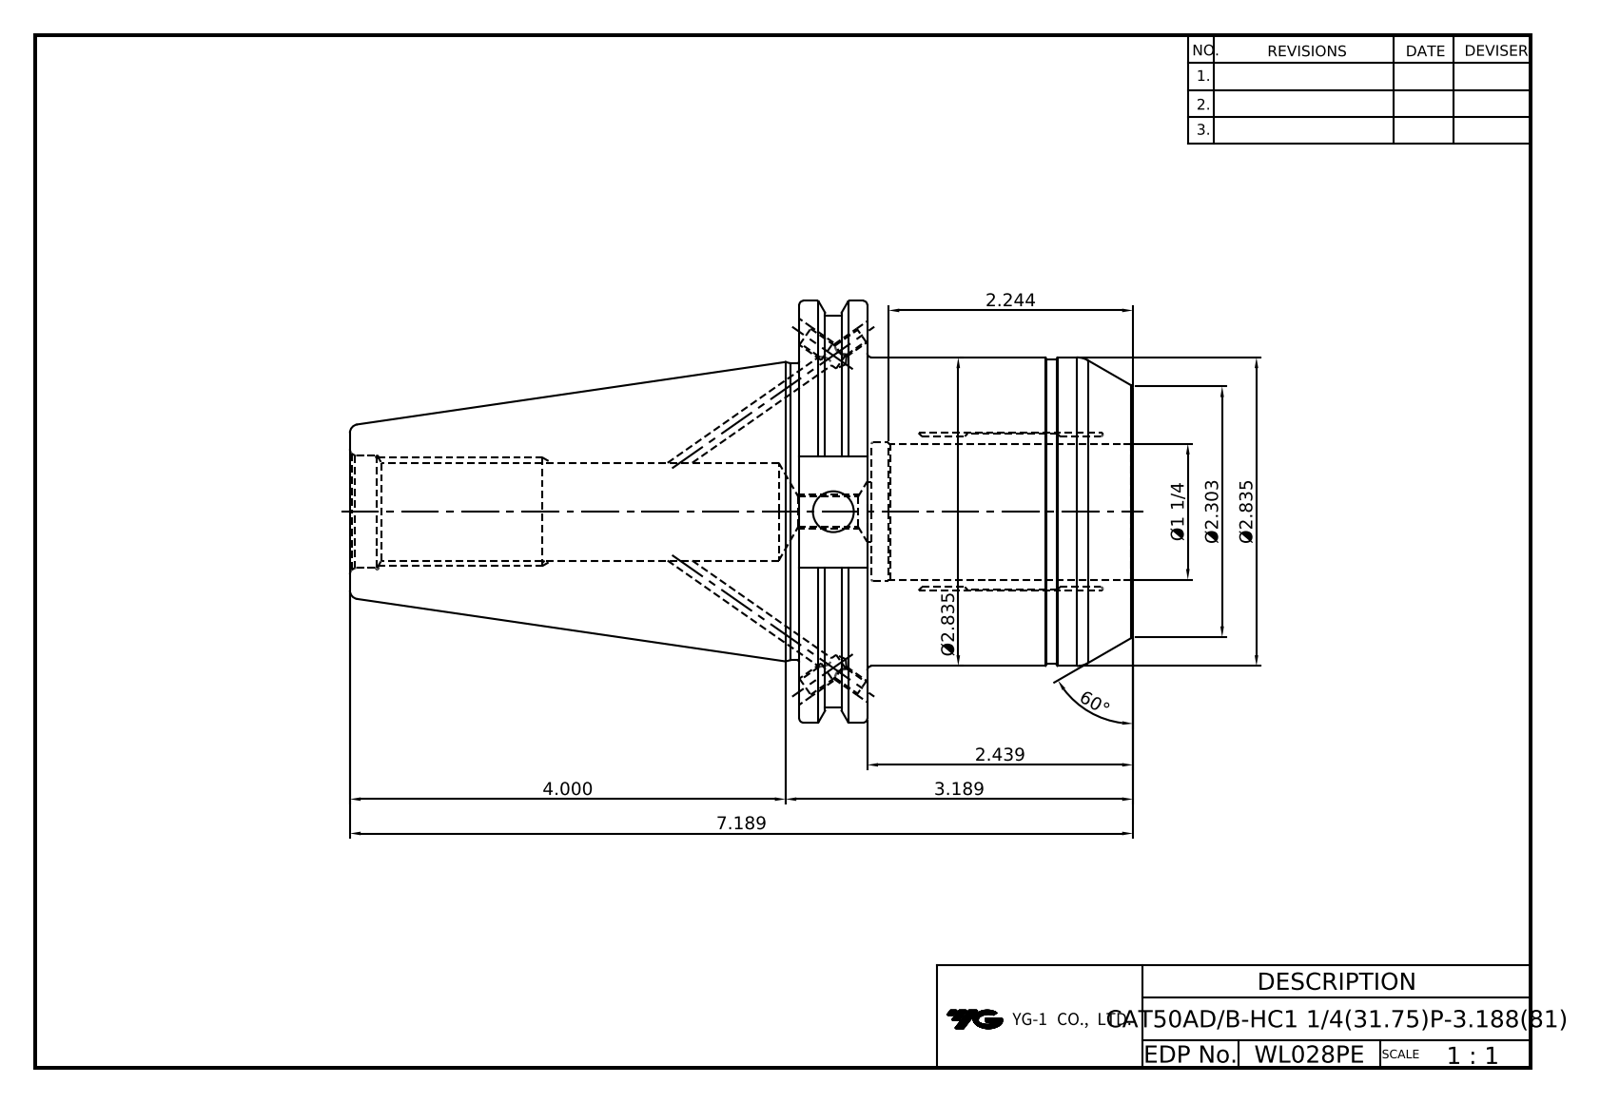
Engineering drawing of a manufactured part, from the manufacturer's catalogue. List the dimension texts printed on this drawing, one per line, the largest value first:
60°
7.189
4.000
3.189
Ø2.835
Ø2.835
2.439
Ø2.303
2.244
Ø1 1/4
